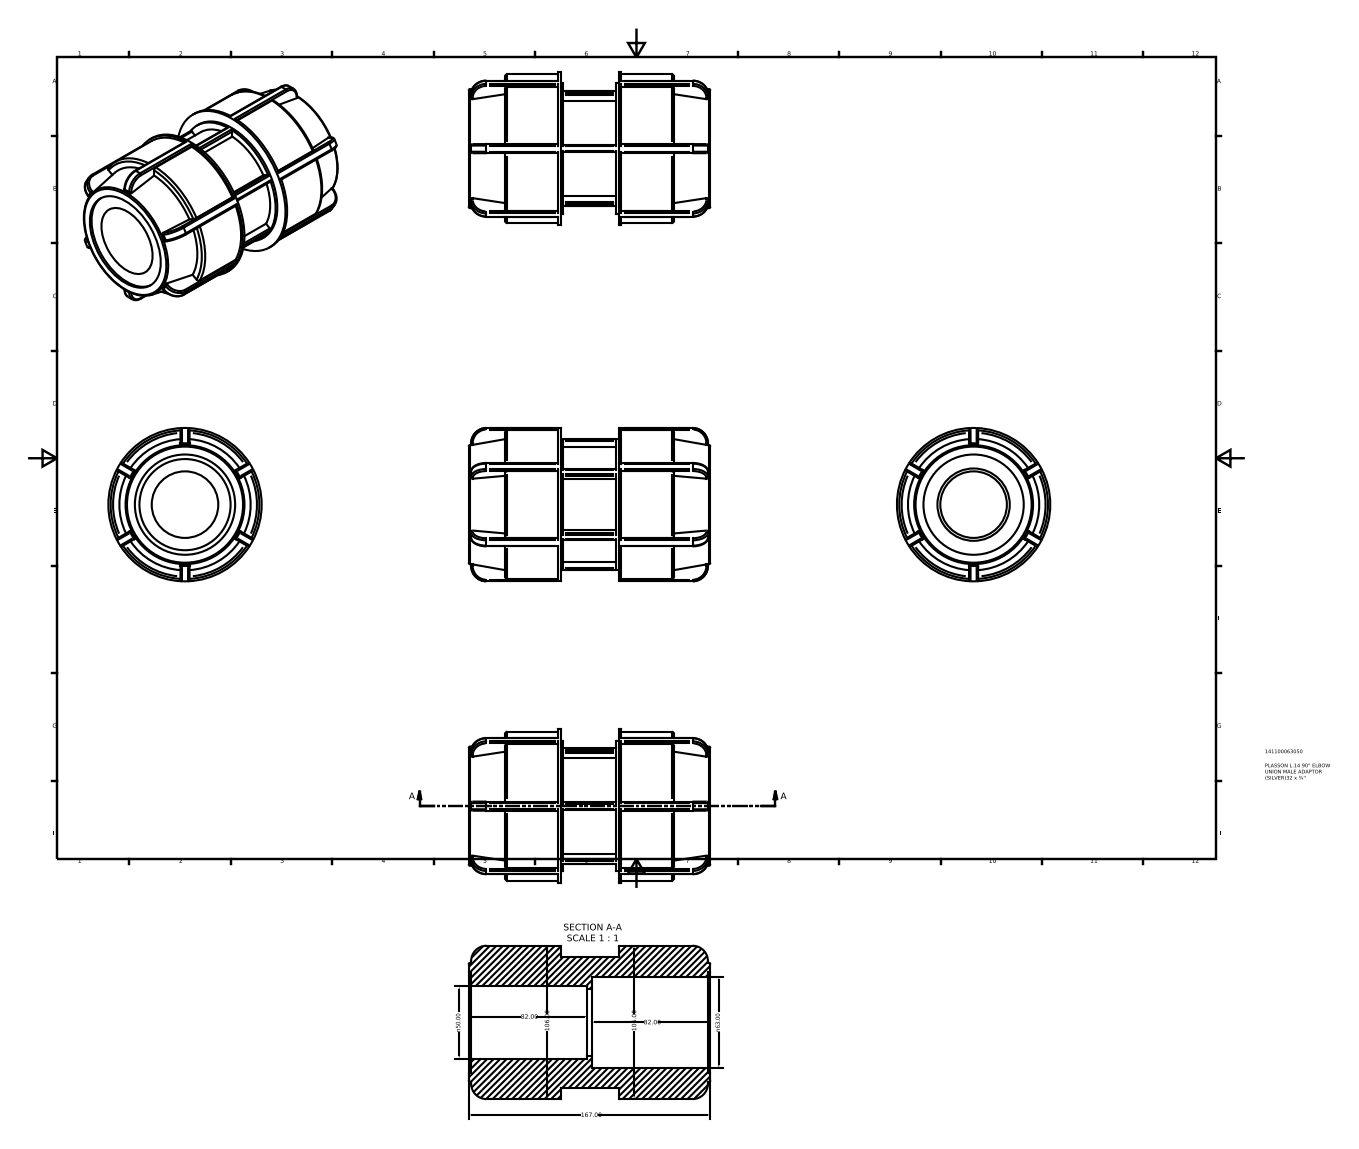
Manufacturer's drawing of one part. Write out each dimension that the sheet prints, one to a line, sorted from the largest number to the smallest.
167.00
106.00
106.00
82.00
82.00
n63.00
n50.00
